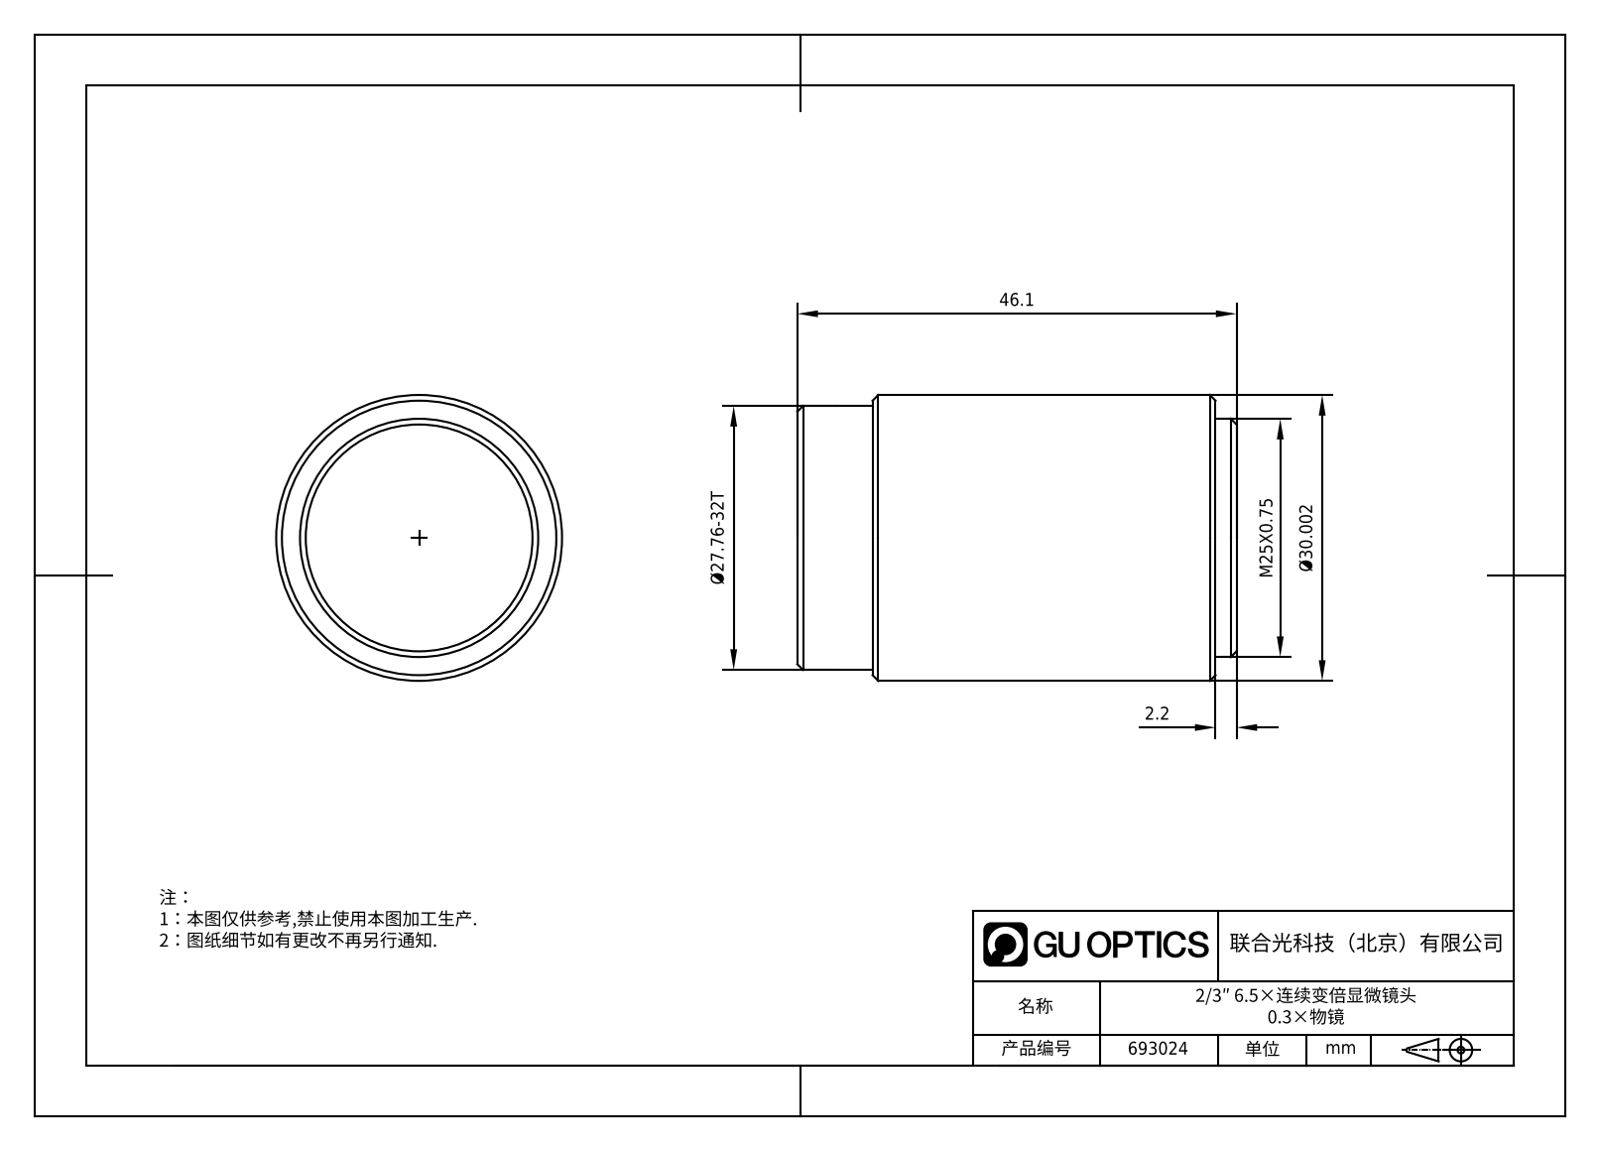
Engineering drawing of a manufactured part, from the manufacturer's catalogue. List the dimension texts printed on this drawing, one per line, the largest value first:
46.1
Ø30.002
Ø27.76-32T
M25X0.75
2.2
